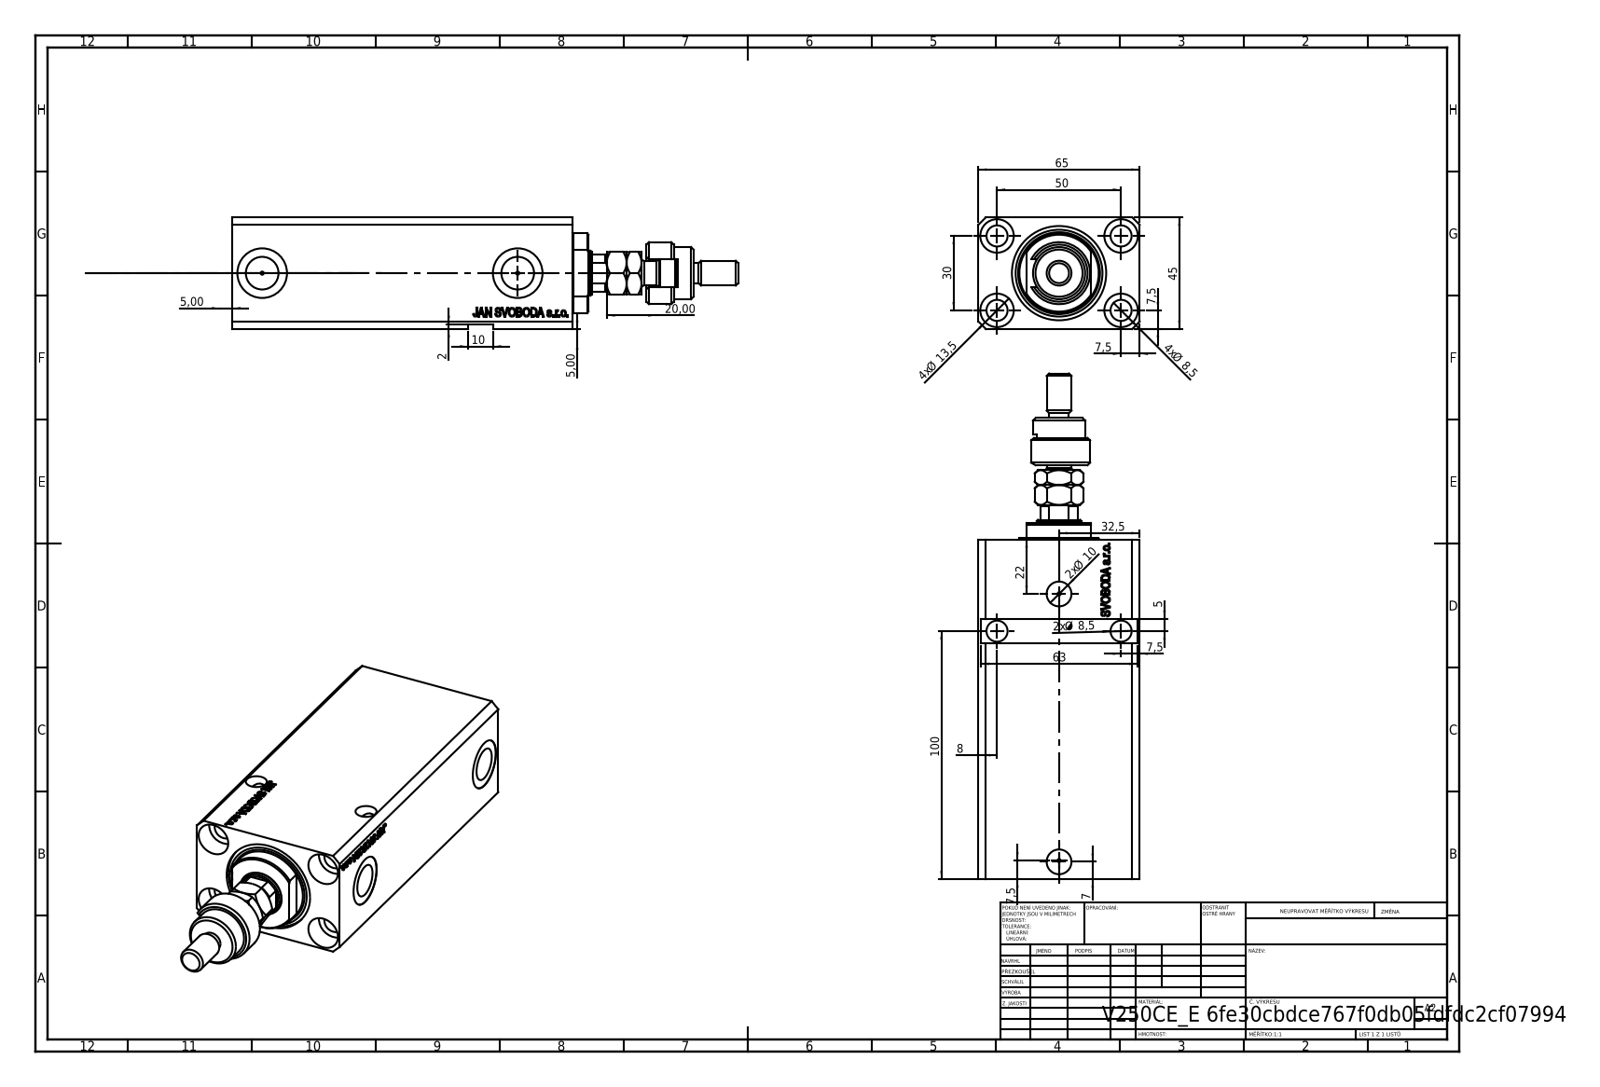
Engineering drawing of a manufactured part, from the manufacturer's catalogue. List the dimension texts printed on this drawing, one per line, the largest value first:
100
65
63
50
45
32,5
30
22
20,00
4x Ø 13,5
10
2x Ø 10
4x Ø 8,5
2x Ø 8,5
8
7,5
7,5
7,5
7,5
7
5,00
5,00
5
2
